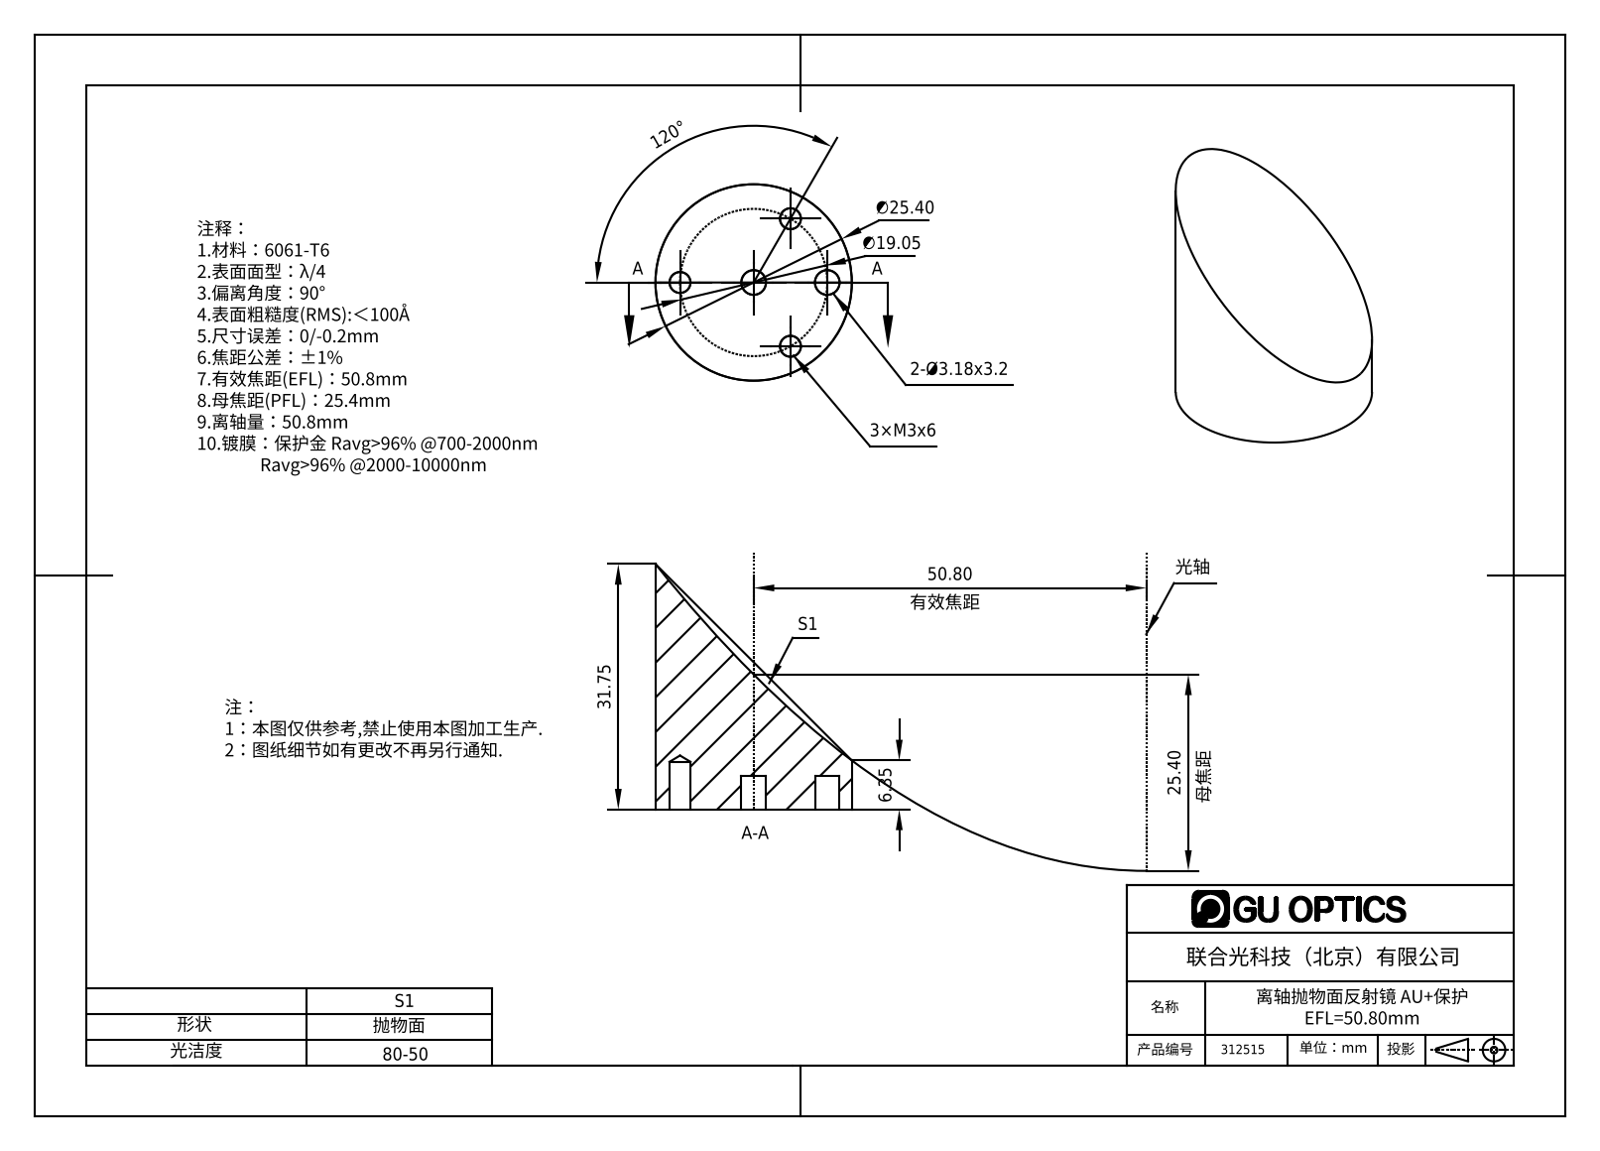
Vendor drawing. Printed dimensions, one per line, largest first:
120°
50.80
31.75
∅25.40
25.40
∅19.05
6.35
